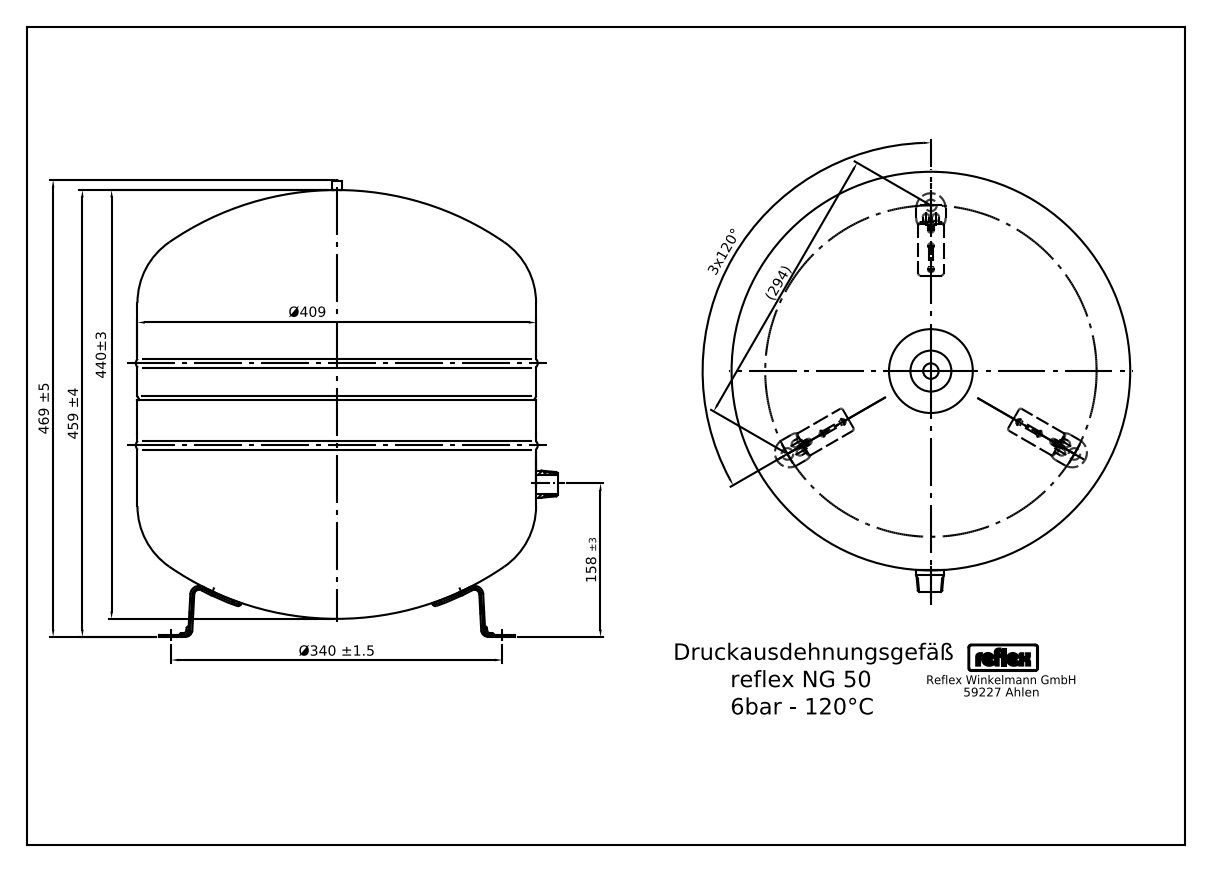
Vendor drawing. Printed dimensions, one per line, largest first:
469 ±5
459 ±4
440±3
Ø409
Ø340 ±1.5
(294)
158 ±3
3x120°
